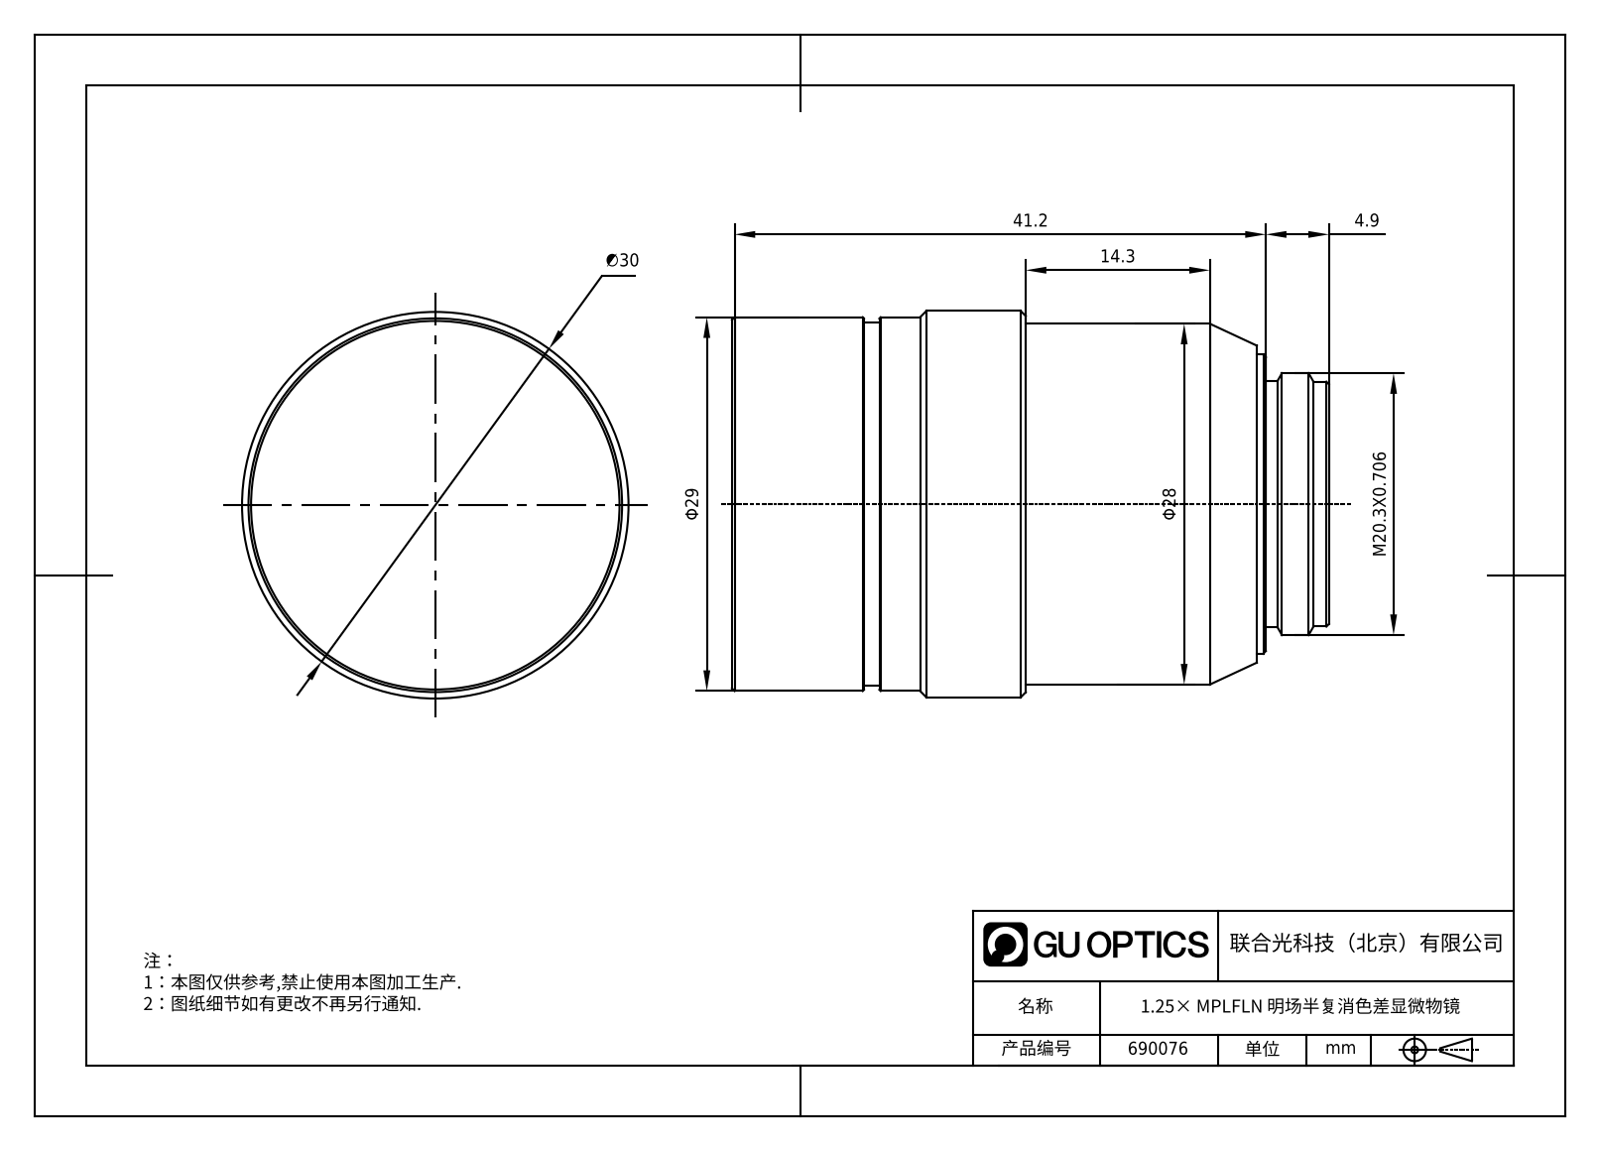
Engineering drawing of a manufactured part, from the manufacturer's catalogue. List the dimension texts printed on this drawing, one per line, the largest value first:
41.2
∅30
Φ29
Φ28
M20.3X0.706
14.3
4.9
